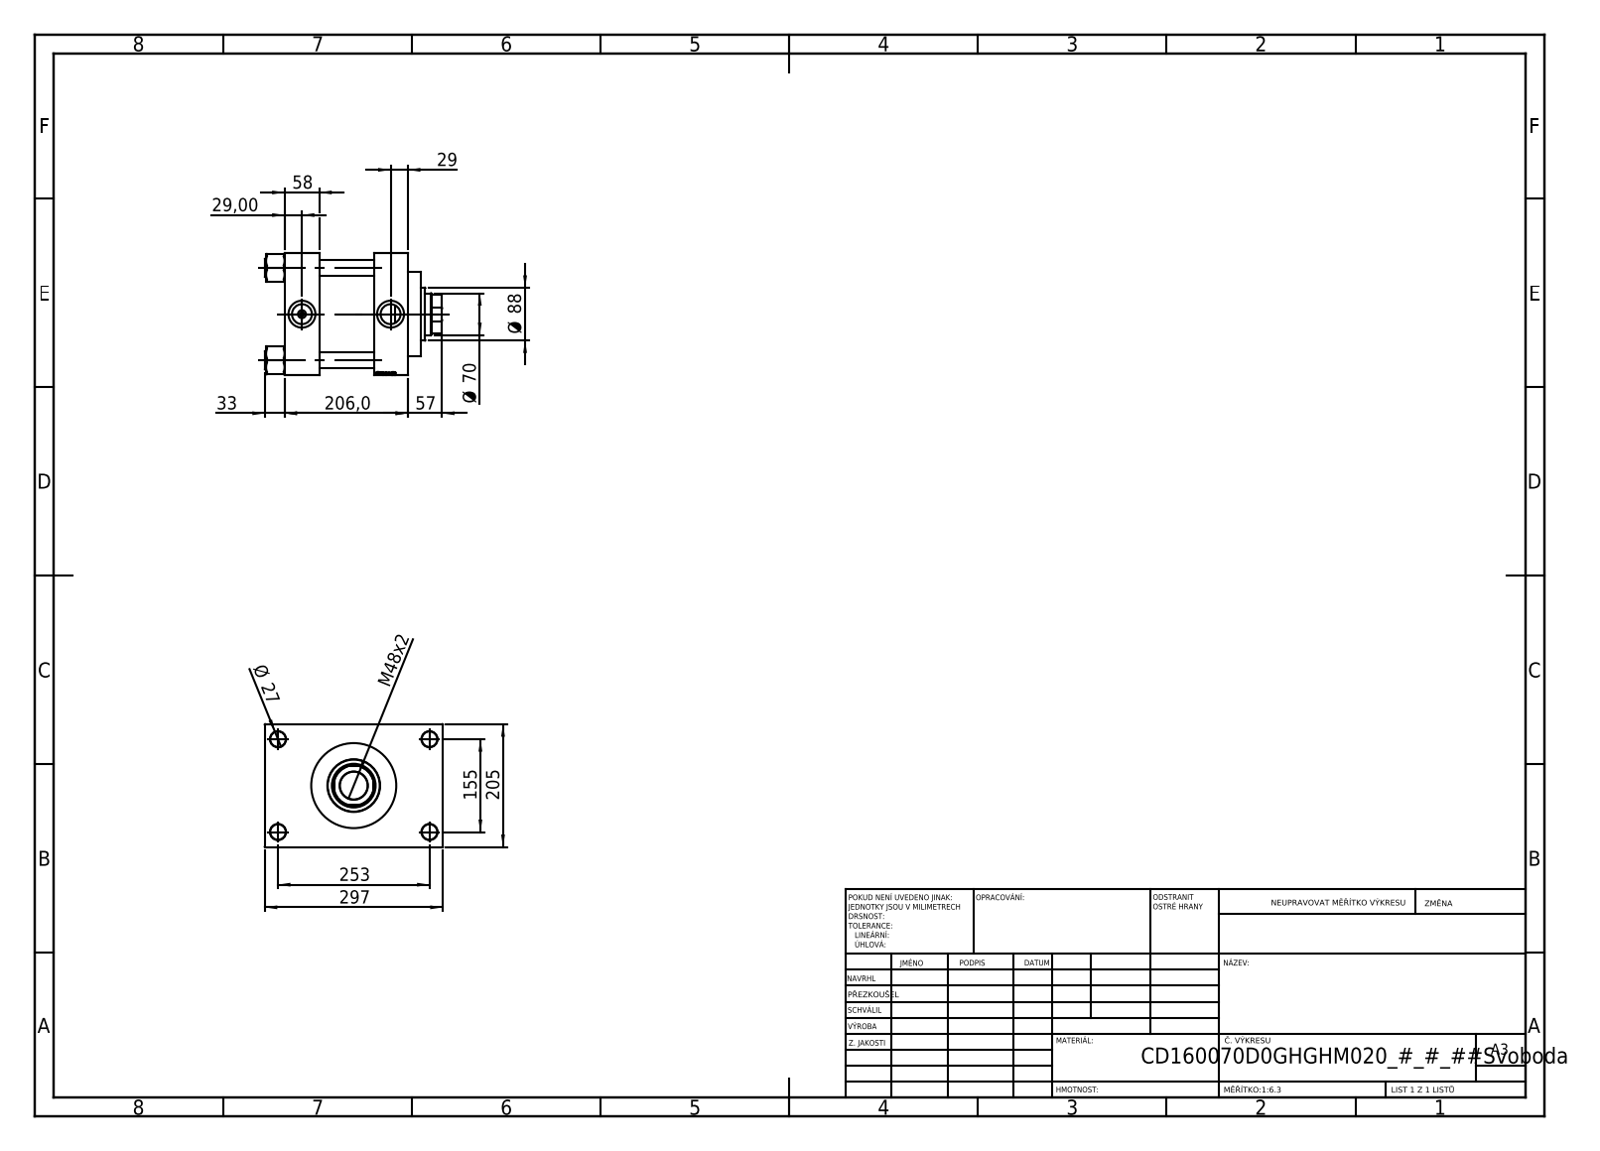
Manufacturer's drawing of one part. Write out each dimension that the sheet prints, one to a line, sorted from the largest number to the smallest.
297
253
206,0
205
155
Ø 88
Ø 70
58
57
M48x2
33
29,00
29
Ø 27
